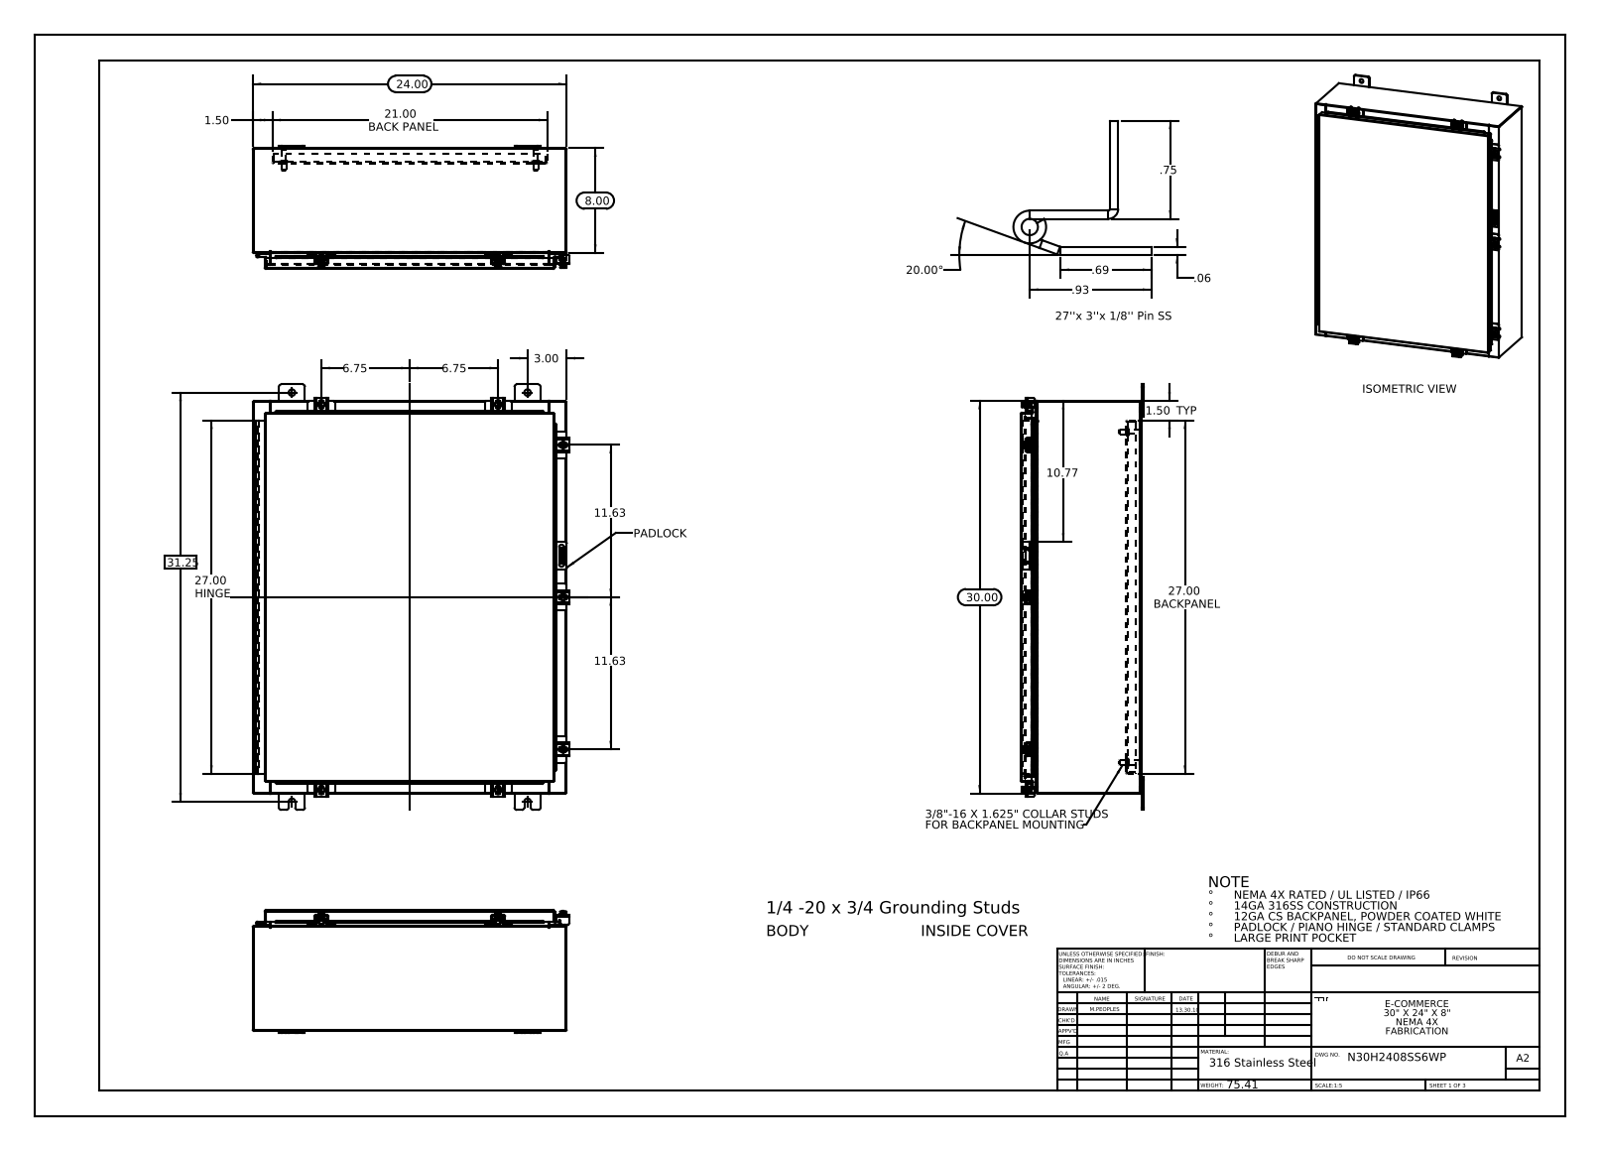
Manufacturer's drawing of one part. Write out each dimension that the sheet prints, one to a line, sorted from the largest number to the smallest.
31.25
30.00
27.00 HINGE
27.00 BACKPANEL
24.00
21.00 BACK PANEL
20.00°
11.63
11.63
10.77
8.00
6.75
6.75
3.00
1.50
1.50 TYP
.93
.75
.69
.06
